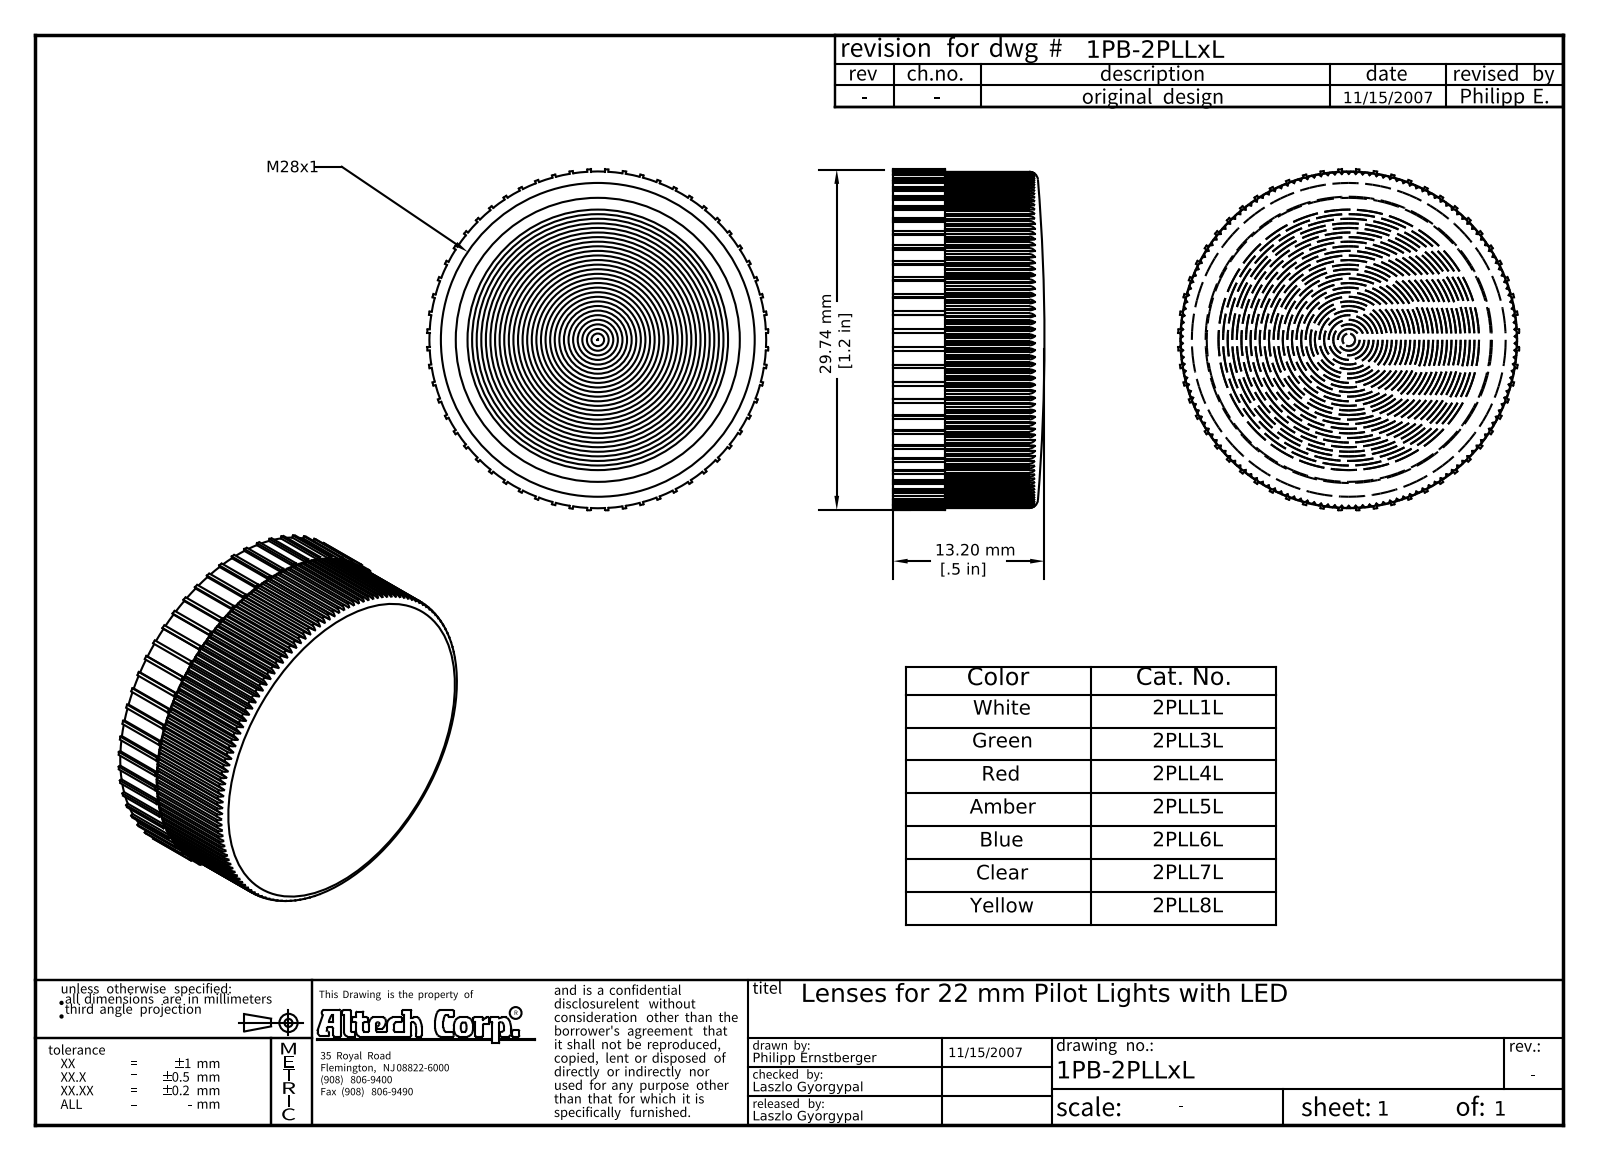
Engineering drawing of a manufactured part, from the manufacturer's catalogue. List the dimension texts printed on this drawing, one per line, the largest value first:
29.74 mm [1.2 in]
M28x1
13.20 mm [.5 in]
